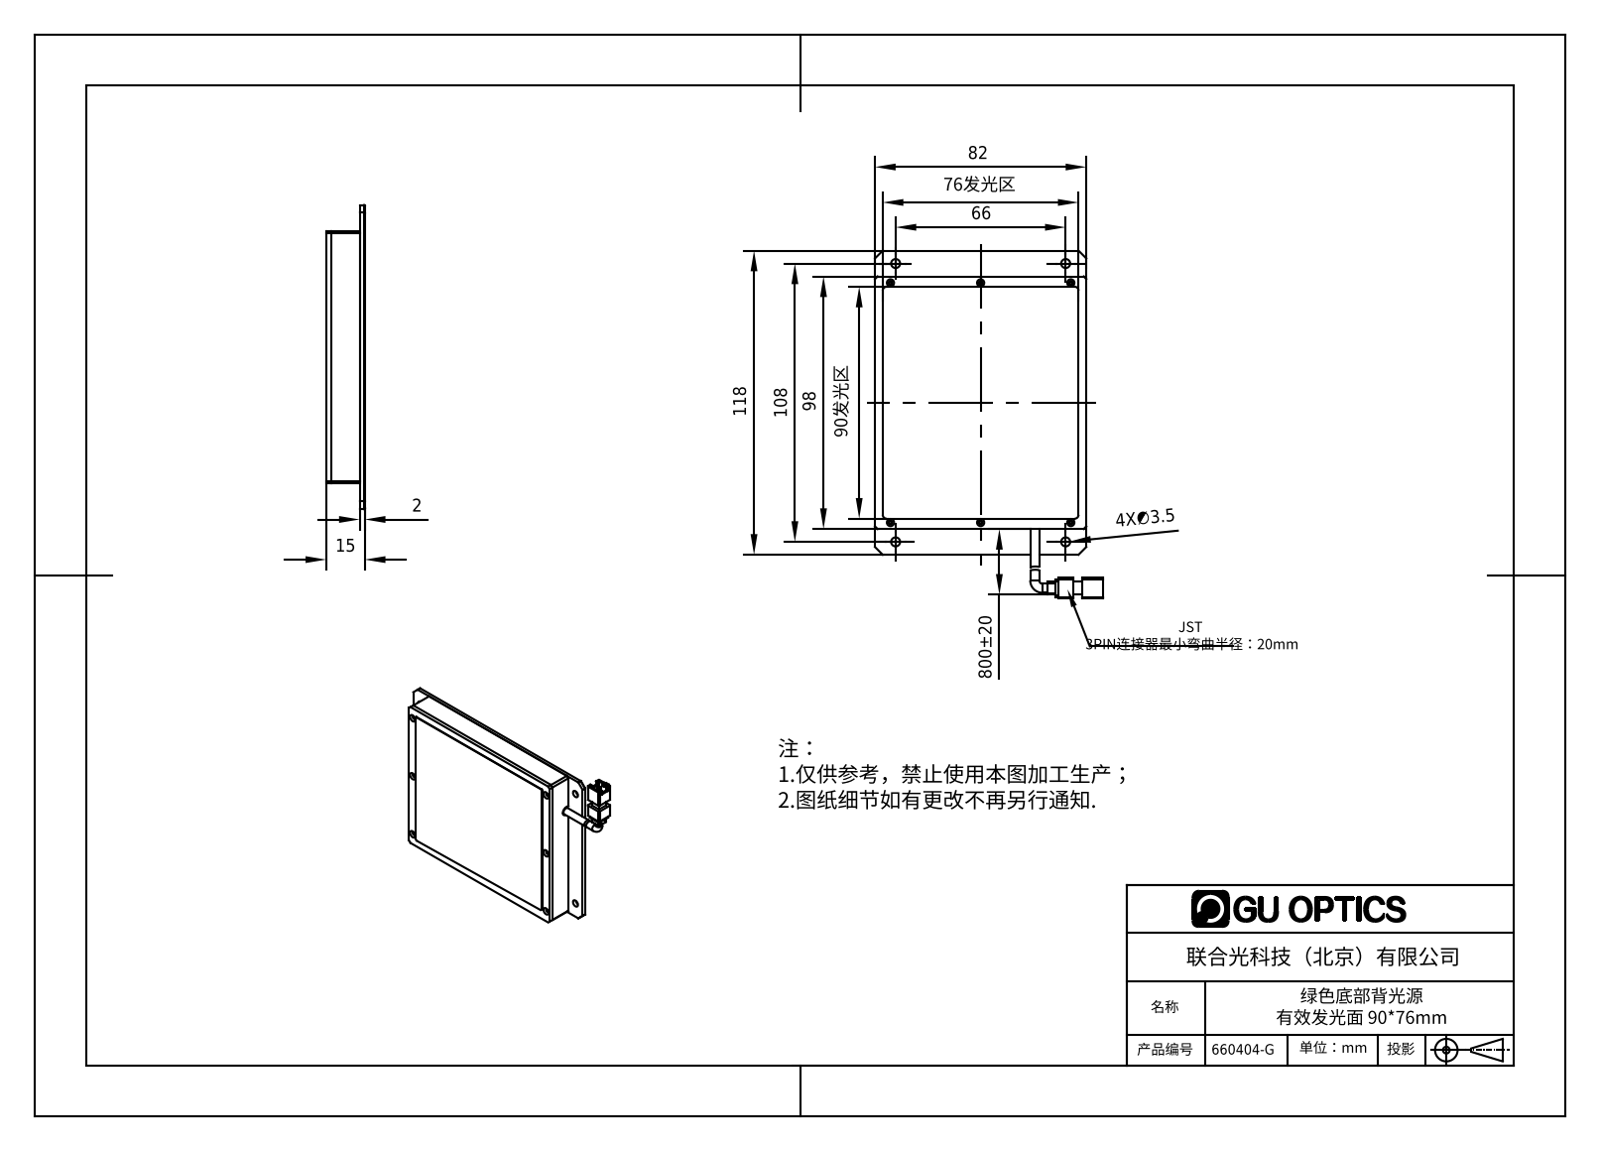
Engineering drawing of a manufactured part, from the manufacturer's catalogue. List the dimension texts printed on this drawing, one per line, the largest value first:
800±20
118
108
98
90发光区
82
76发光区
66
15
4X∅3.5
2
